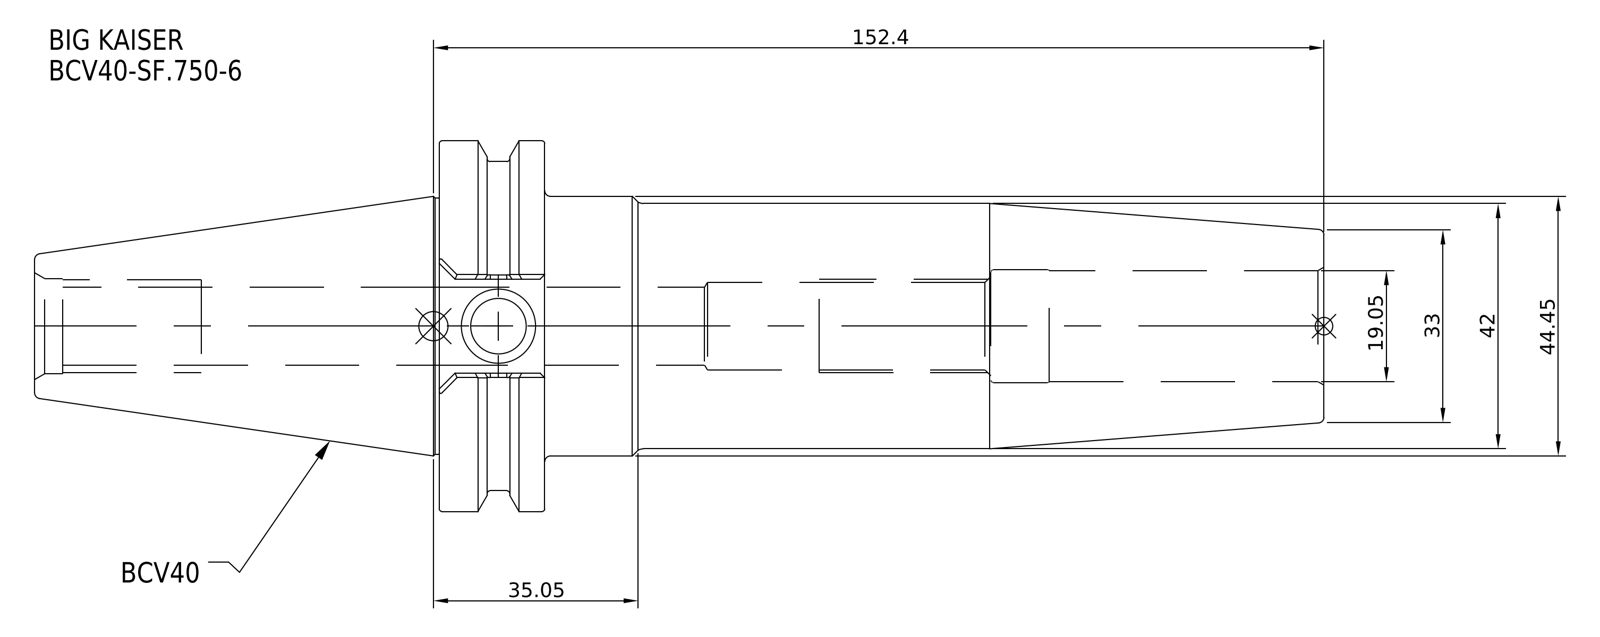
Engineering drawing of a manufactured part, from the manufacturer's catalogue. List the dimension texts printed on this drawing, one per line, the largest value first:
152.4
44.45
42
35.05
33
19.05
